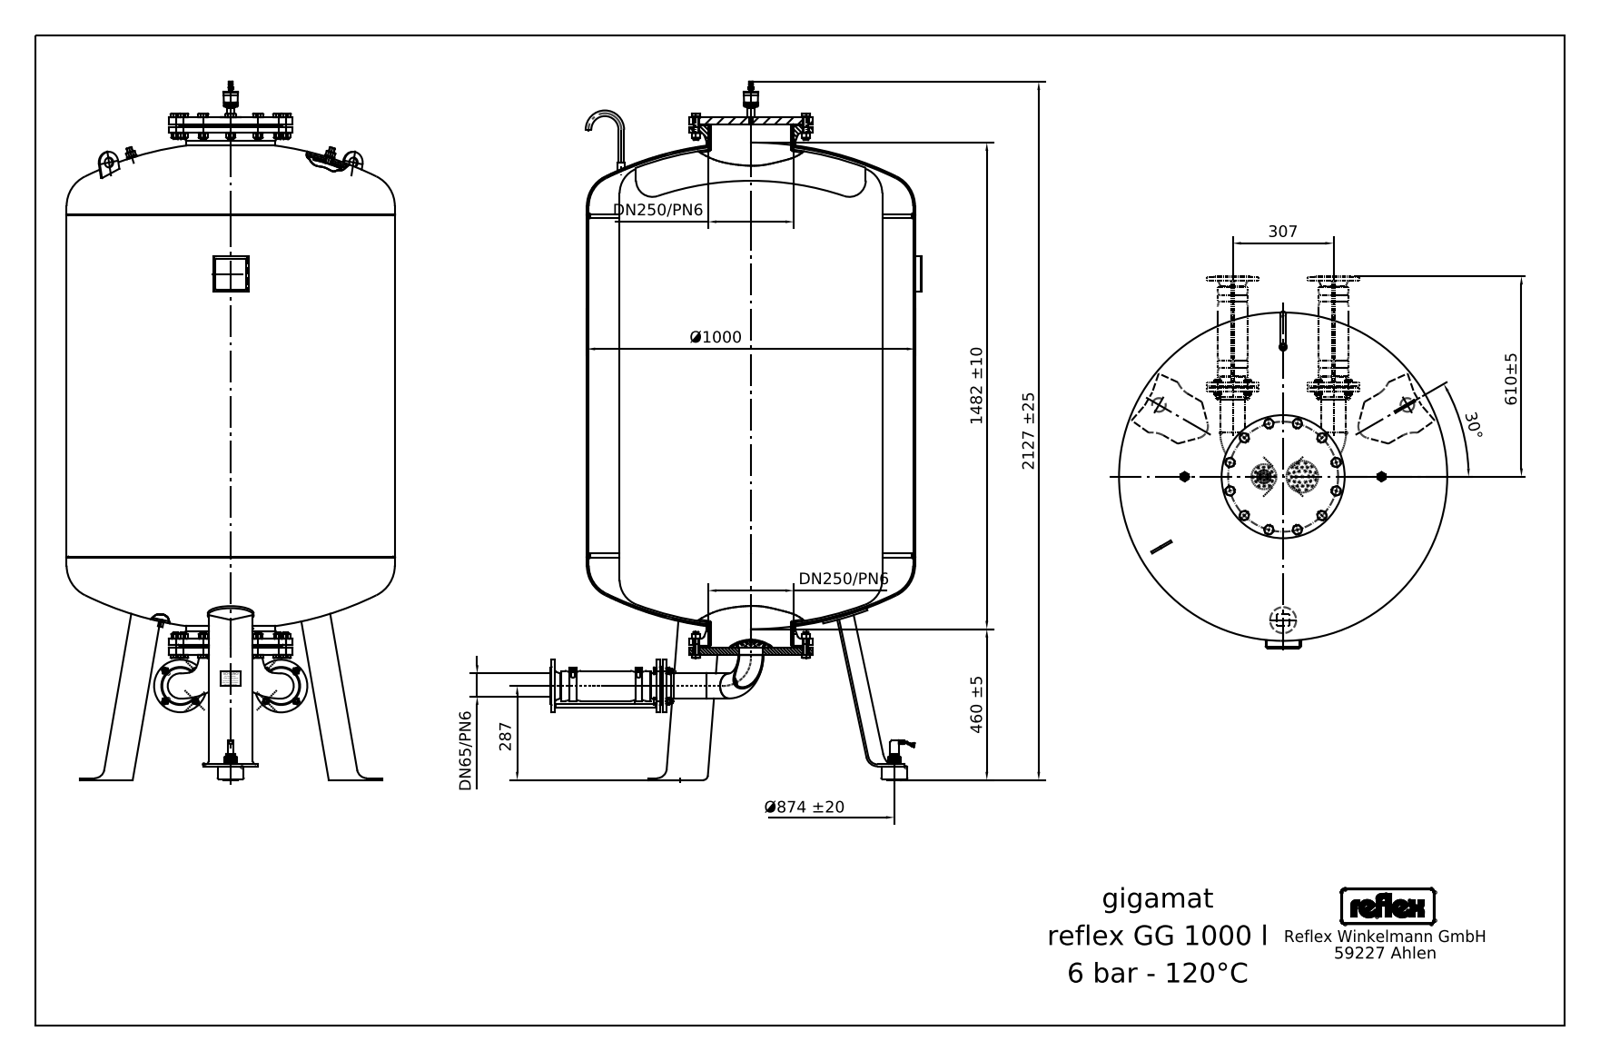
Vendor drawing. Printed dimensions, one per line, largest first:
2127 ±25
1482 ±10
Ø1000
Ø874 ±20
610±5
460 ±5
307
287
DN250/PN6
DN250/PN6
DN65/PN6
30°
